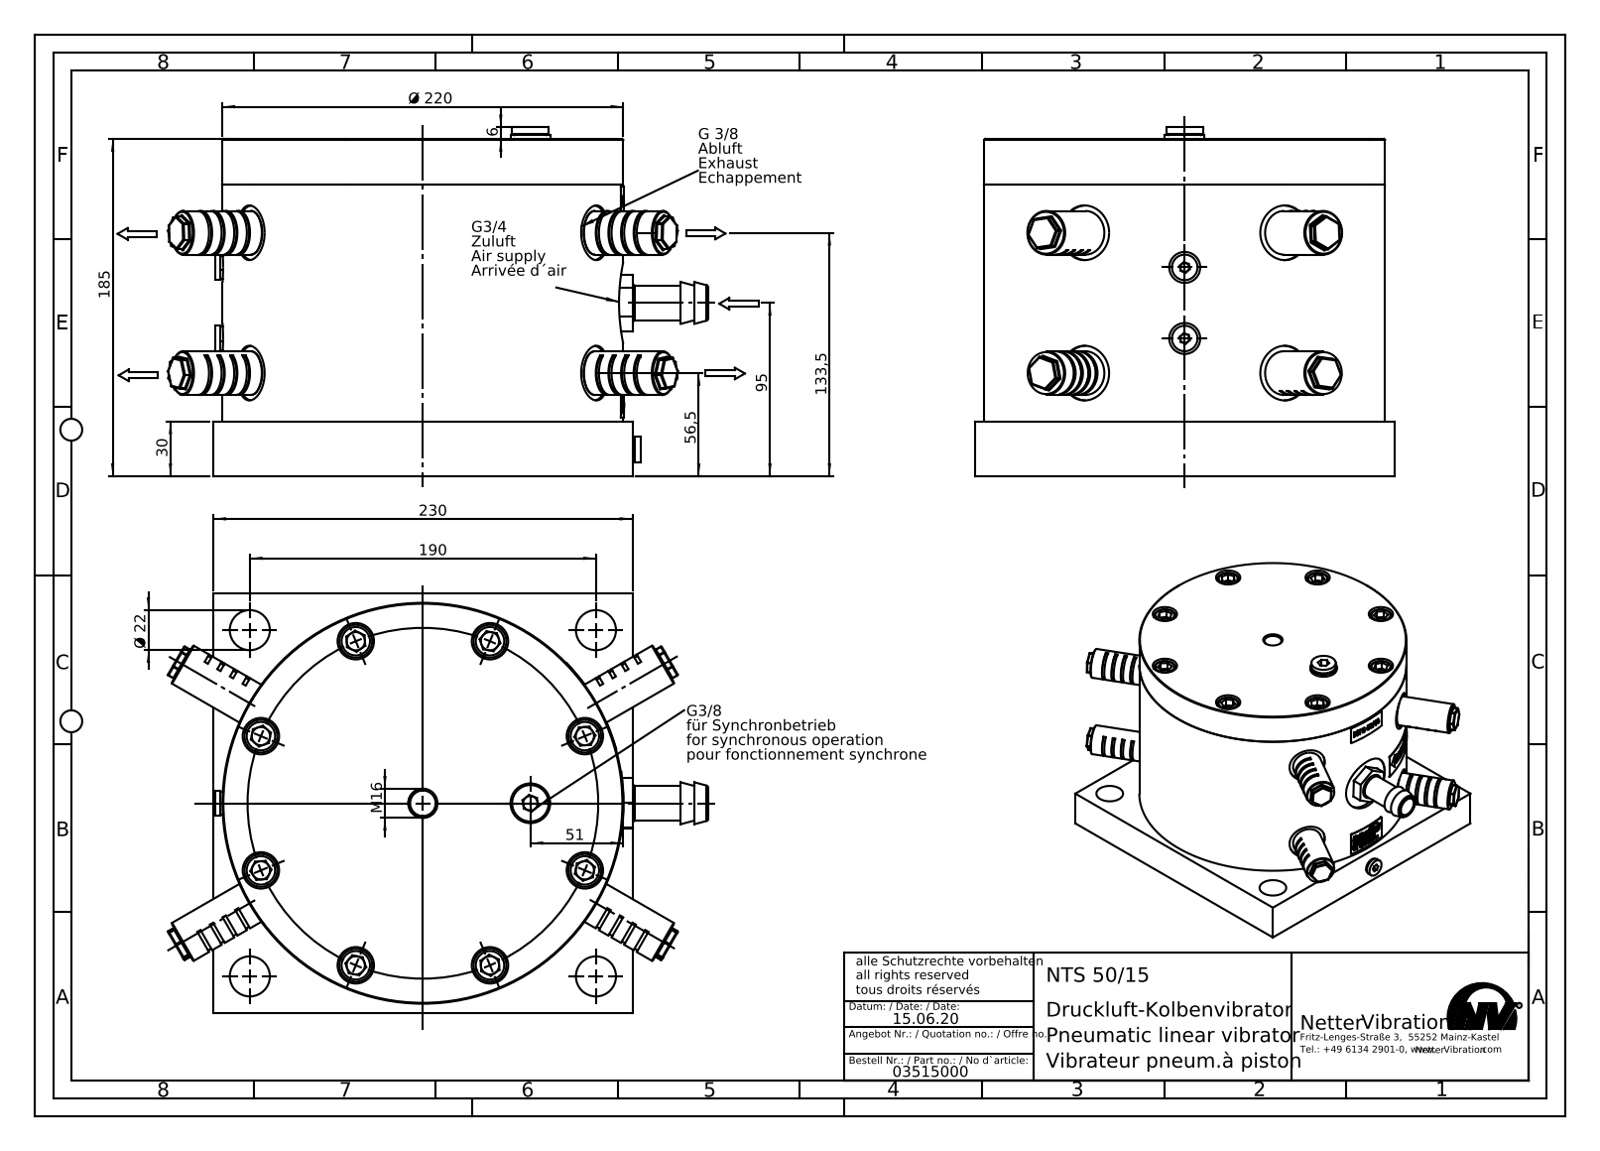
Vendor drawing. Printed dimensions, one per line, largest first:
230
Ø 220
190
185
133,5
95
56,5
51
30
Ø 22
M 16
6
